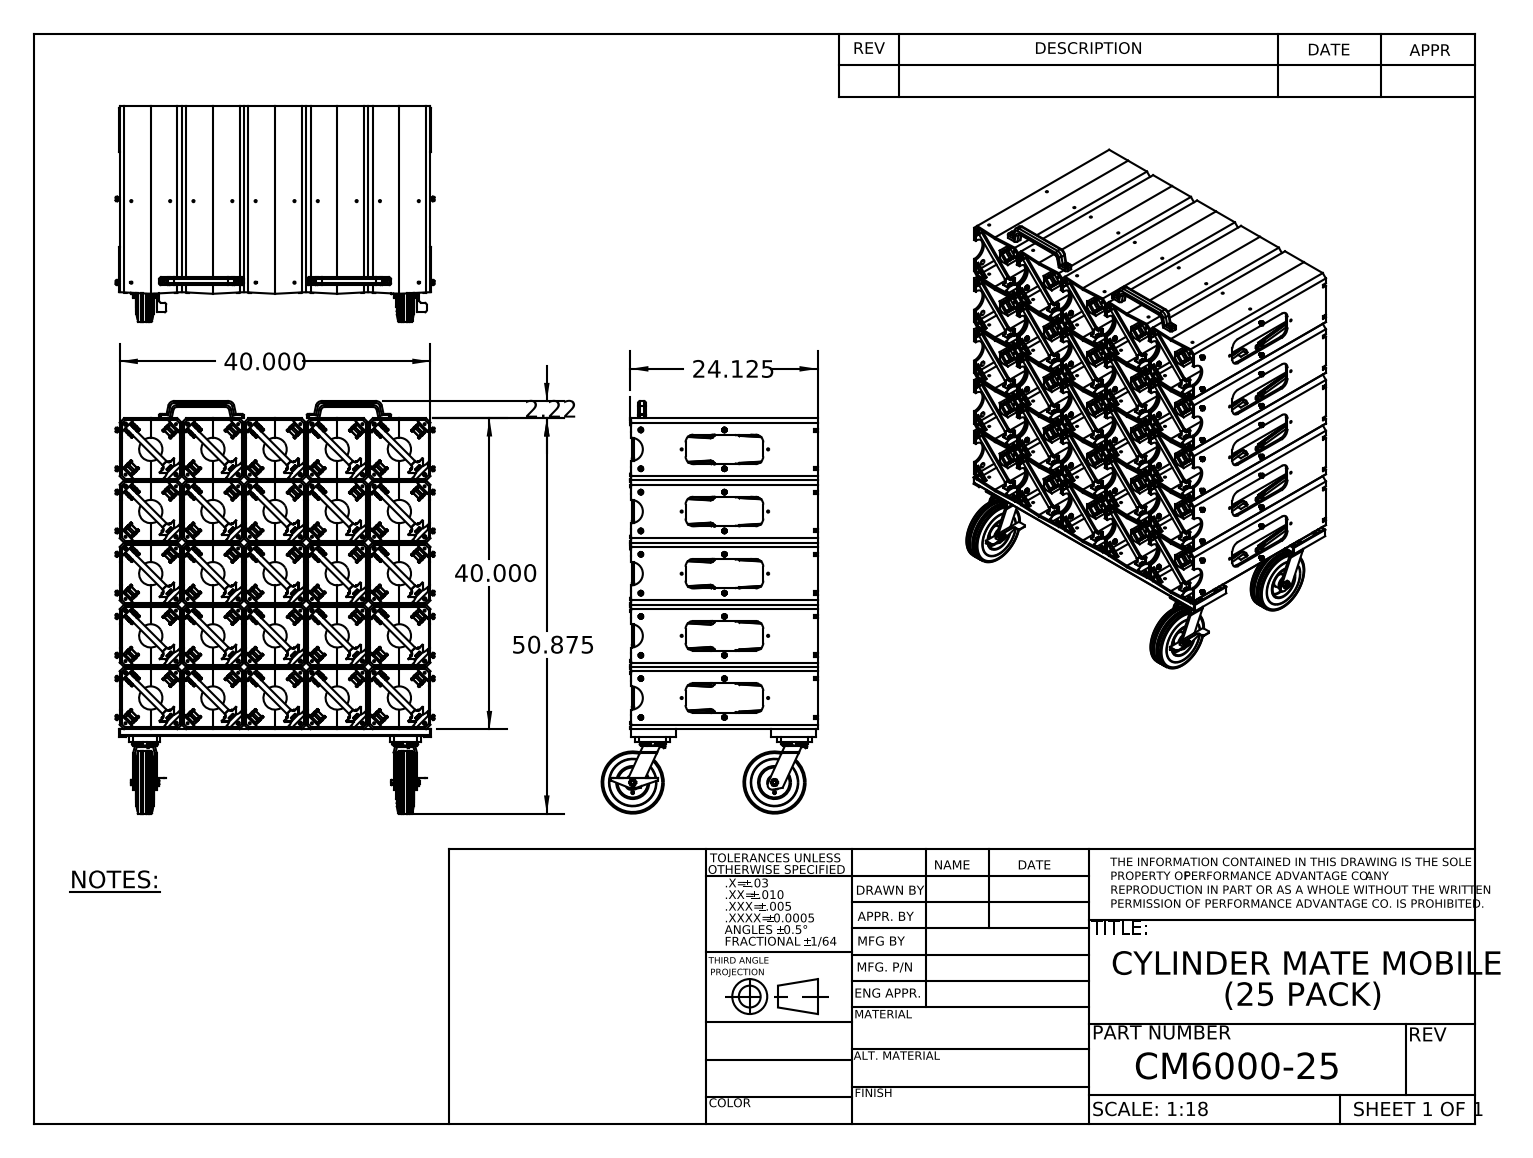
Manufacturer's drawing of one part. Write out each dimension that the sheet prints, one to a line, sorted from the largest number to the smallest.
50.875
40.000
40.000
24.125
2.22
